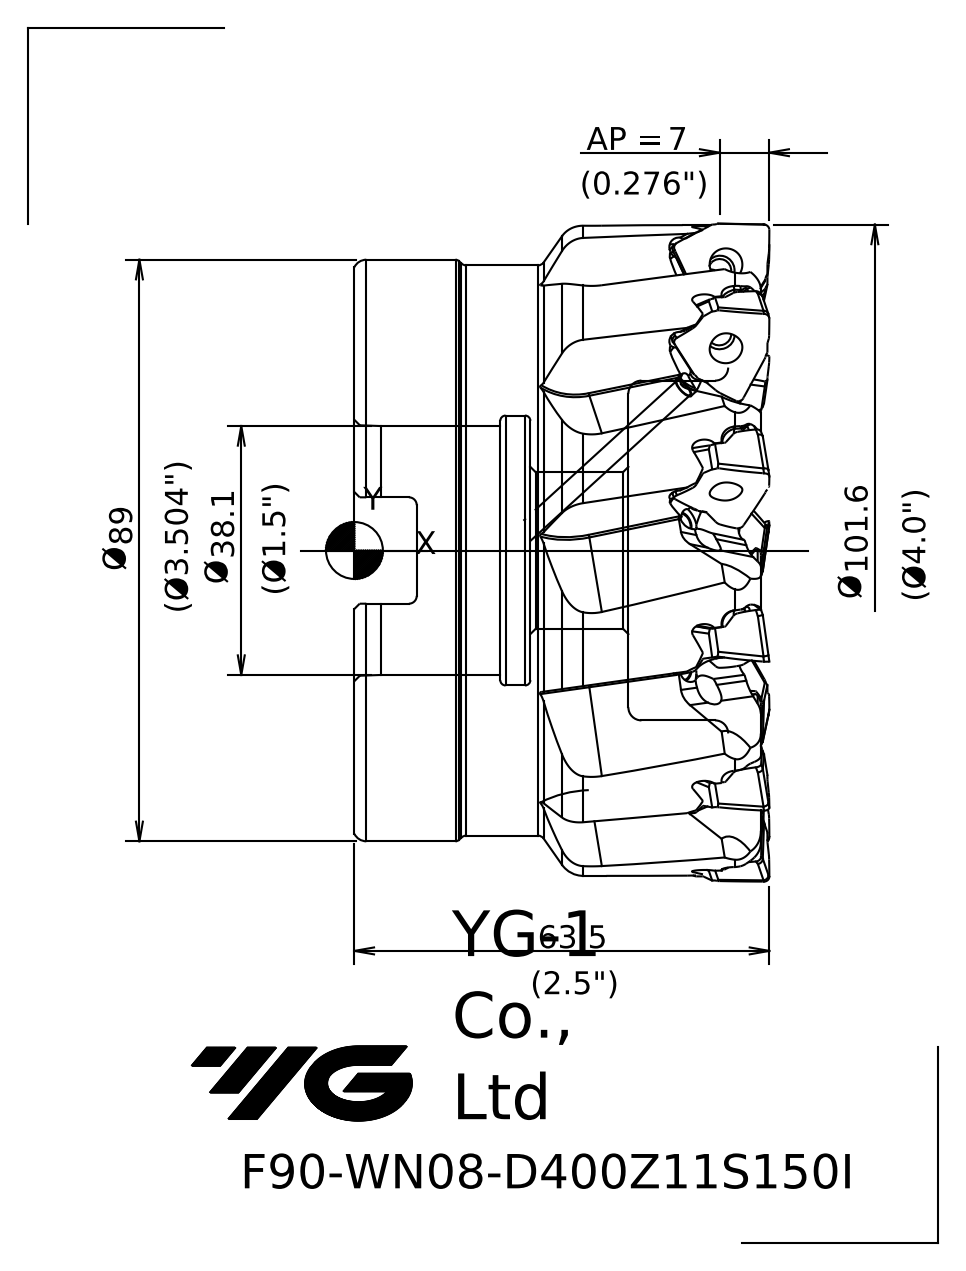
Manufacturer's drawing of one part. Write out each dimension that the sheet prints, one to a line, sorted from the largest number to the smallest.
101.6 Ø
63.5
38.1 Ø
7 AP =
